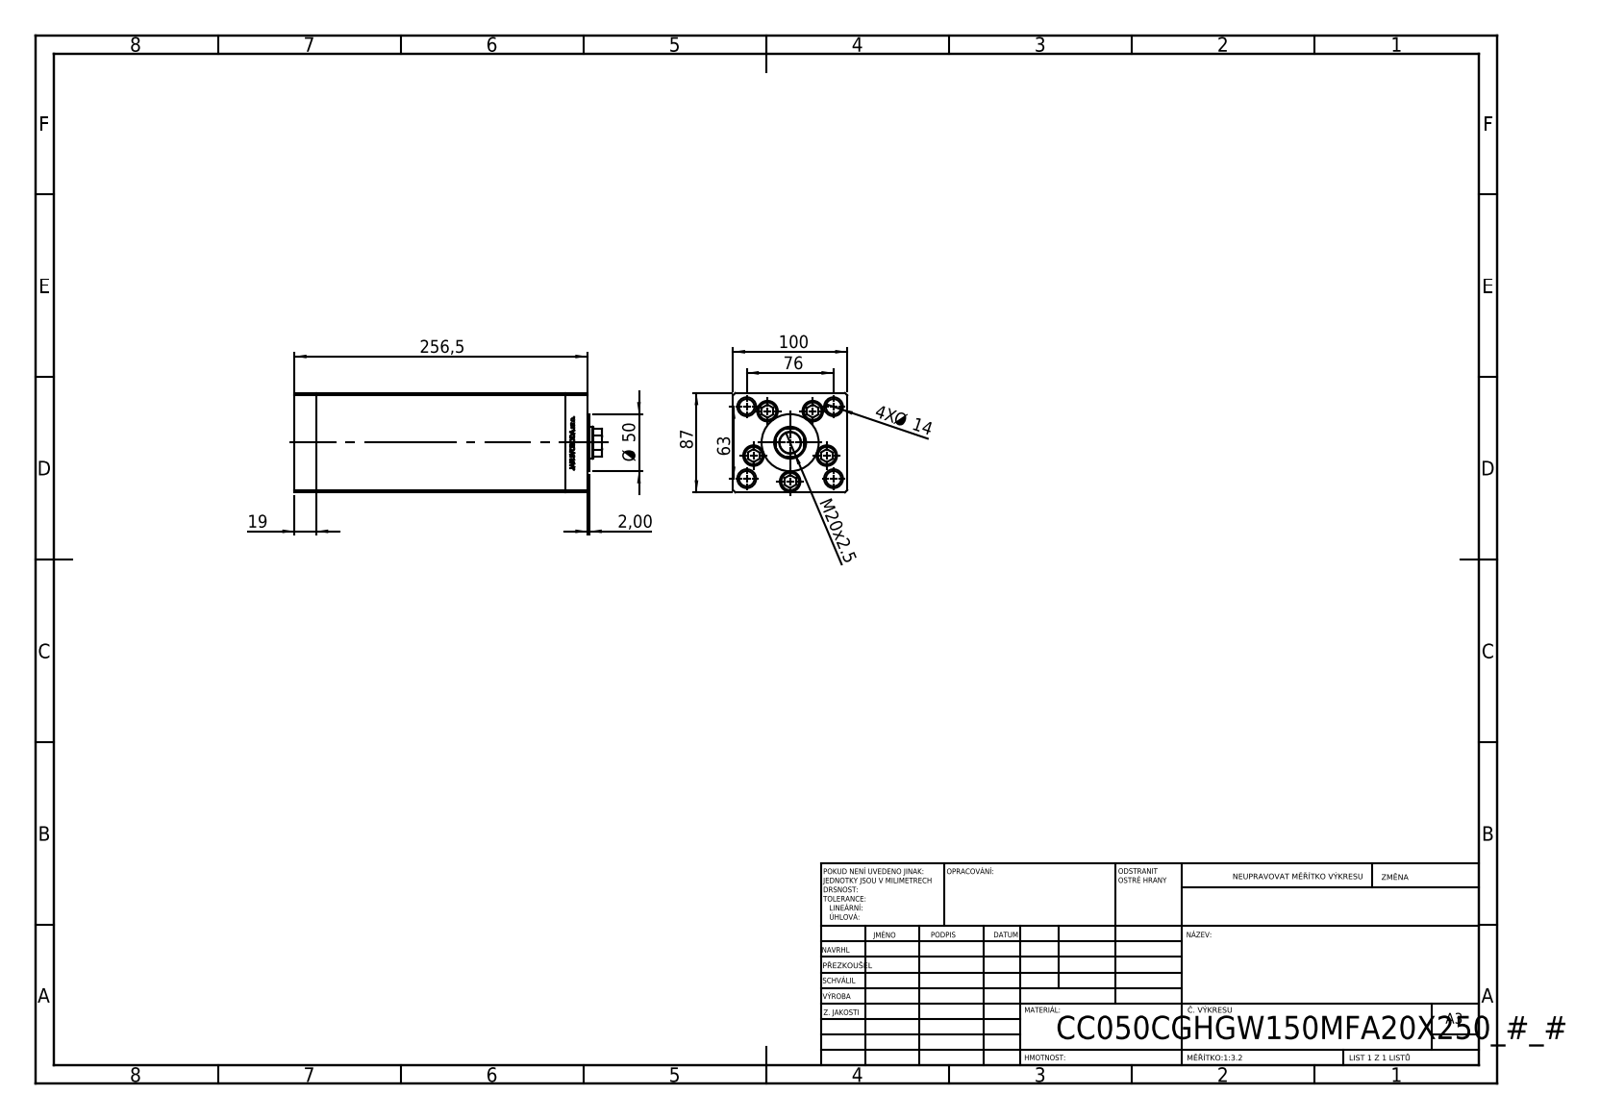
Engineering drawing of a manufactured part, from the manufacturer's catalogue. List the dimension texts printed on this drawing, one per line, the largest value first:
256,5
100
87
76
63
Ø 50
M20x2.5
19
4X Ø 14
2,00
